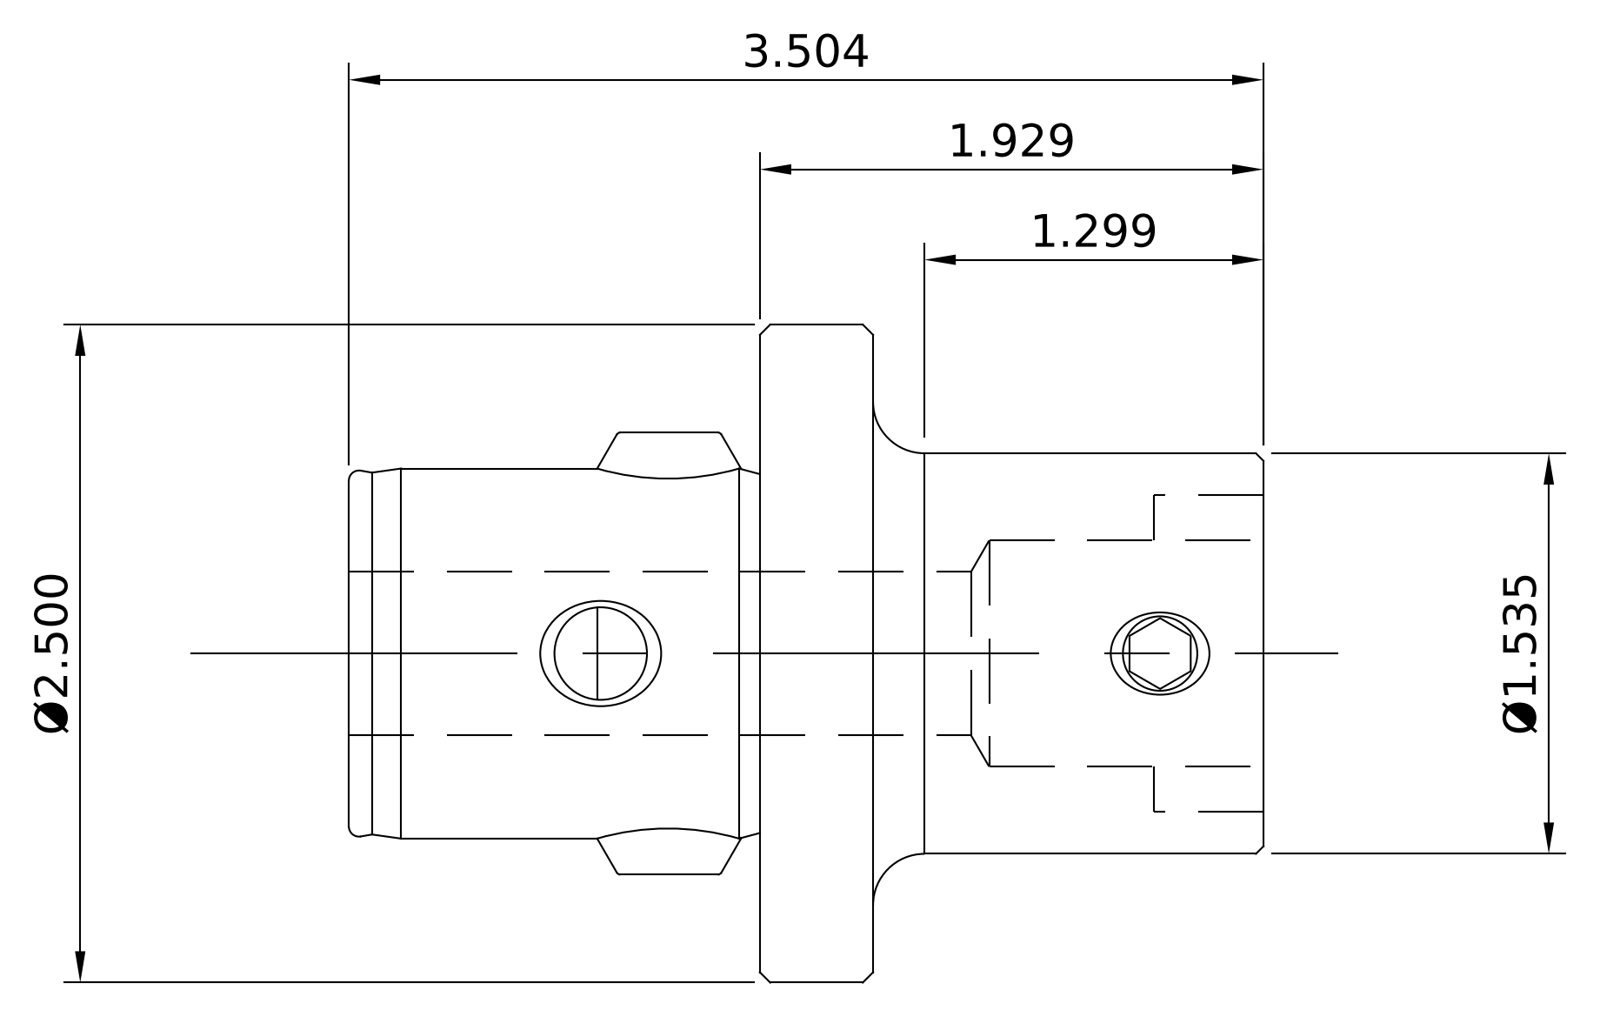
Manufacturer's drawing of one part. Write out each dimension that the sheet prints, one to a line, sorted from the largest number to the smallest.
3.504
Ø2.500
1.929
Ø1.535
1.299
